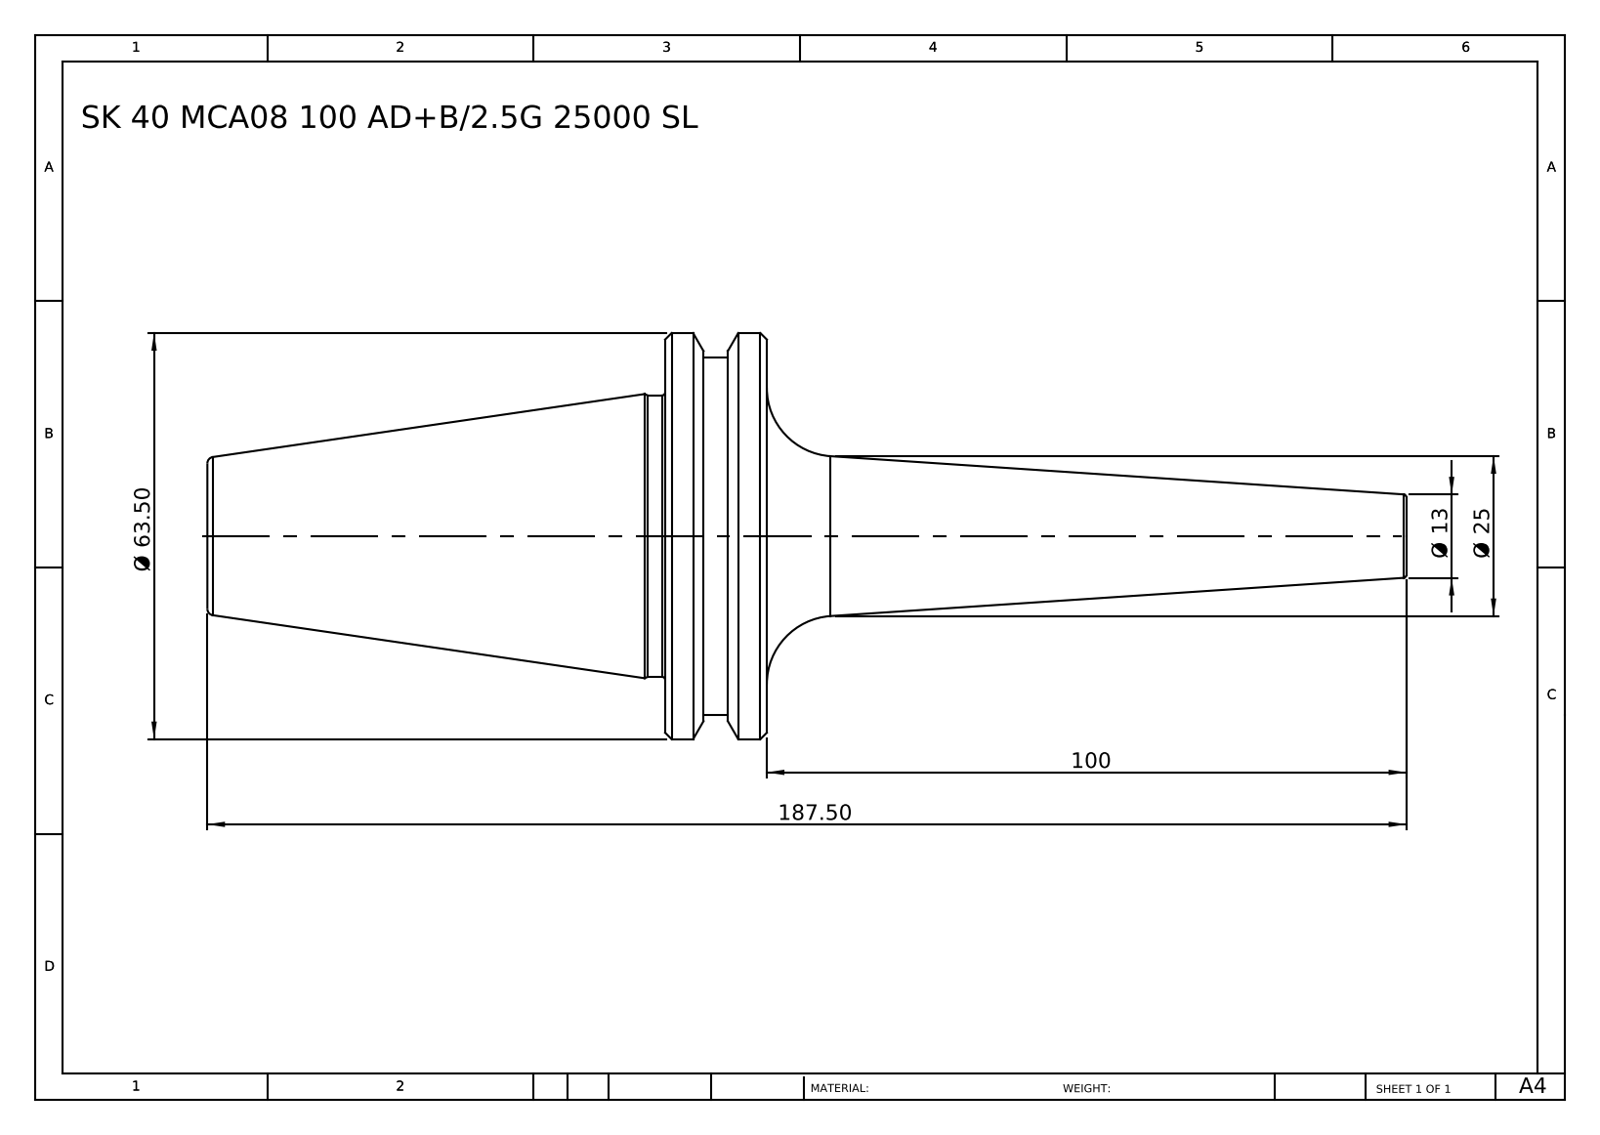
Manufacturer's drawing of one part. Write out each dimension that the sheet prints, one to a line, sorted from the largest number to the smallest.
187.50
100
Ø 63.50
Ø 25
Ø 13
